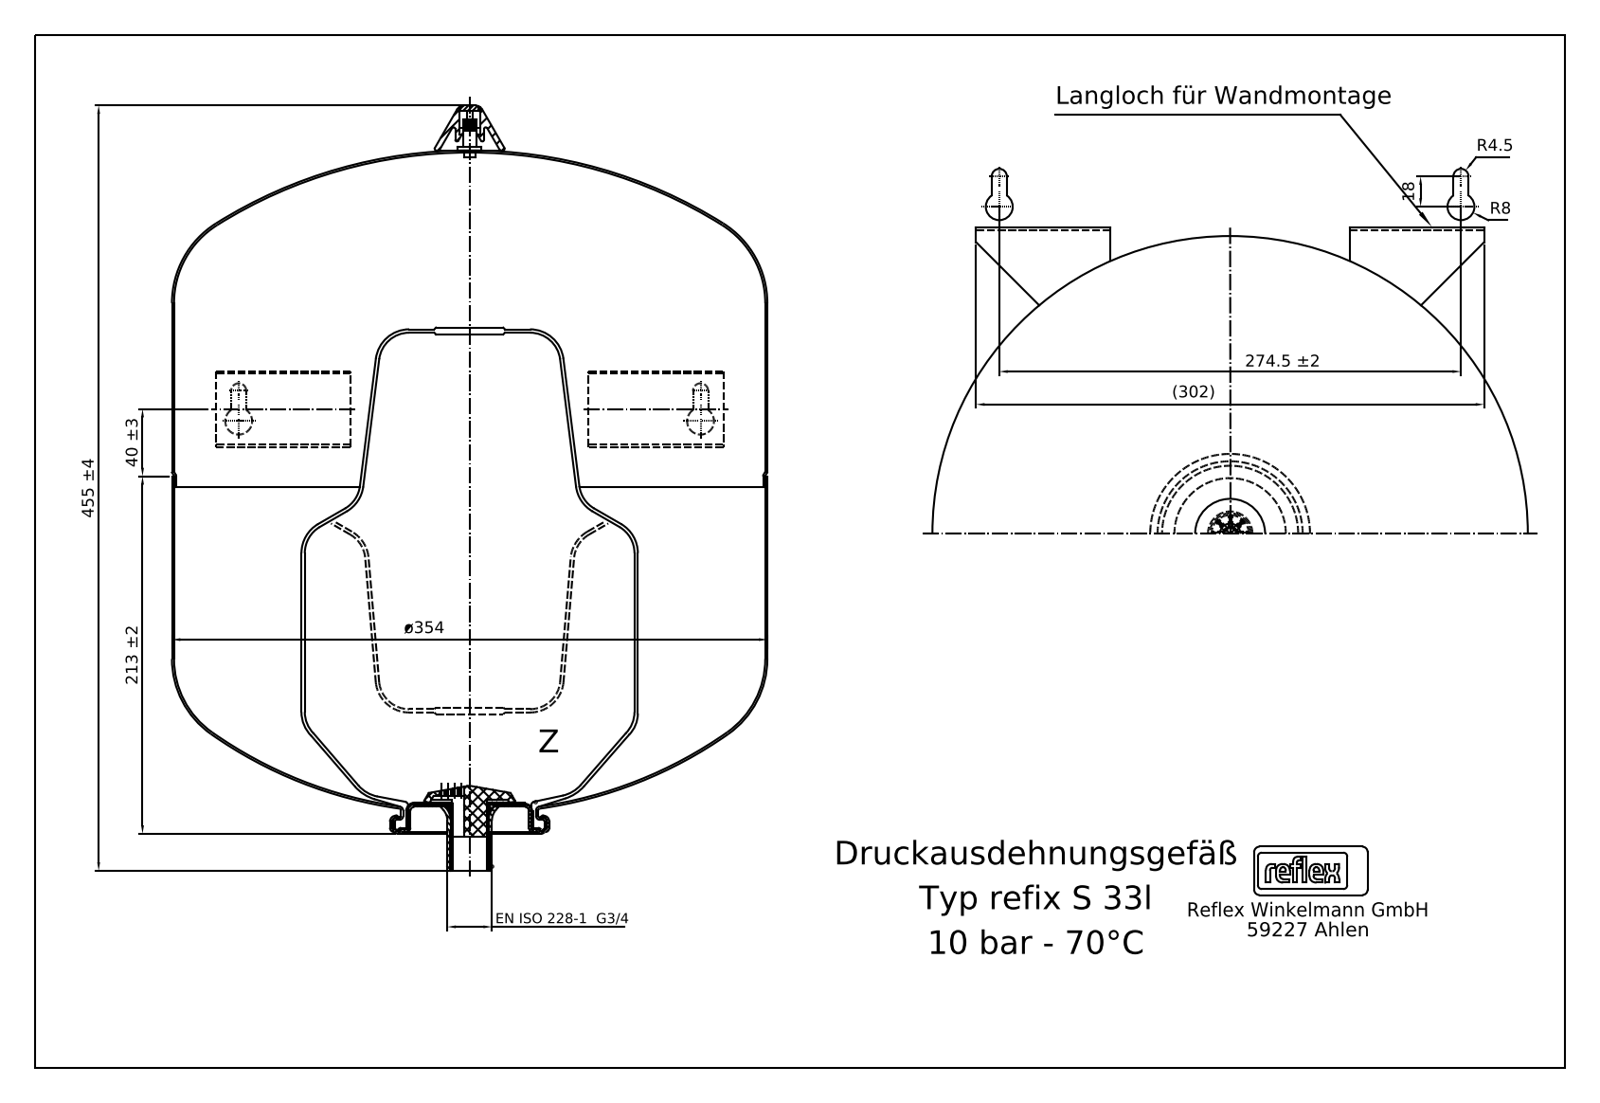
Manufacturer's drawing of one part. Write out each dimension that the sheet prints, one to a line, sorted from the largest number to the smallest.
455 ±4
ø354
(302)
274.5 ±2
EN ISO 228-1 G3/4
213 ±2
40 ±3
18
R8
R4.5
